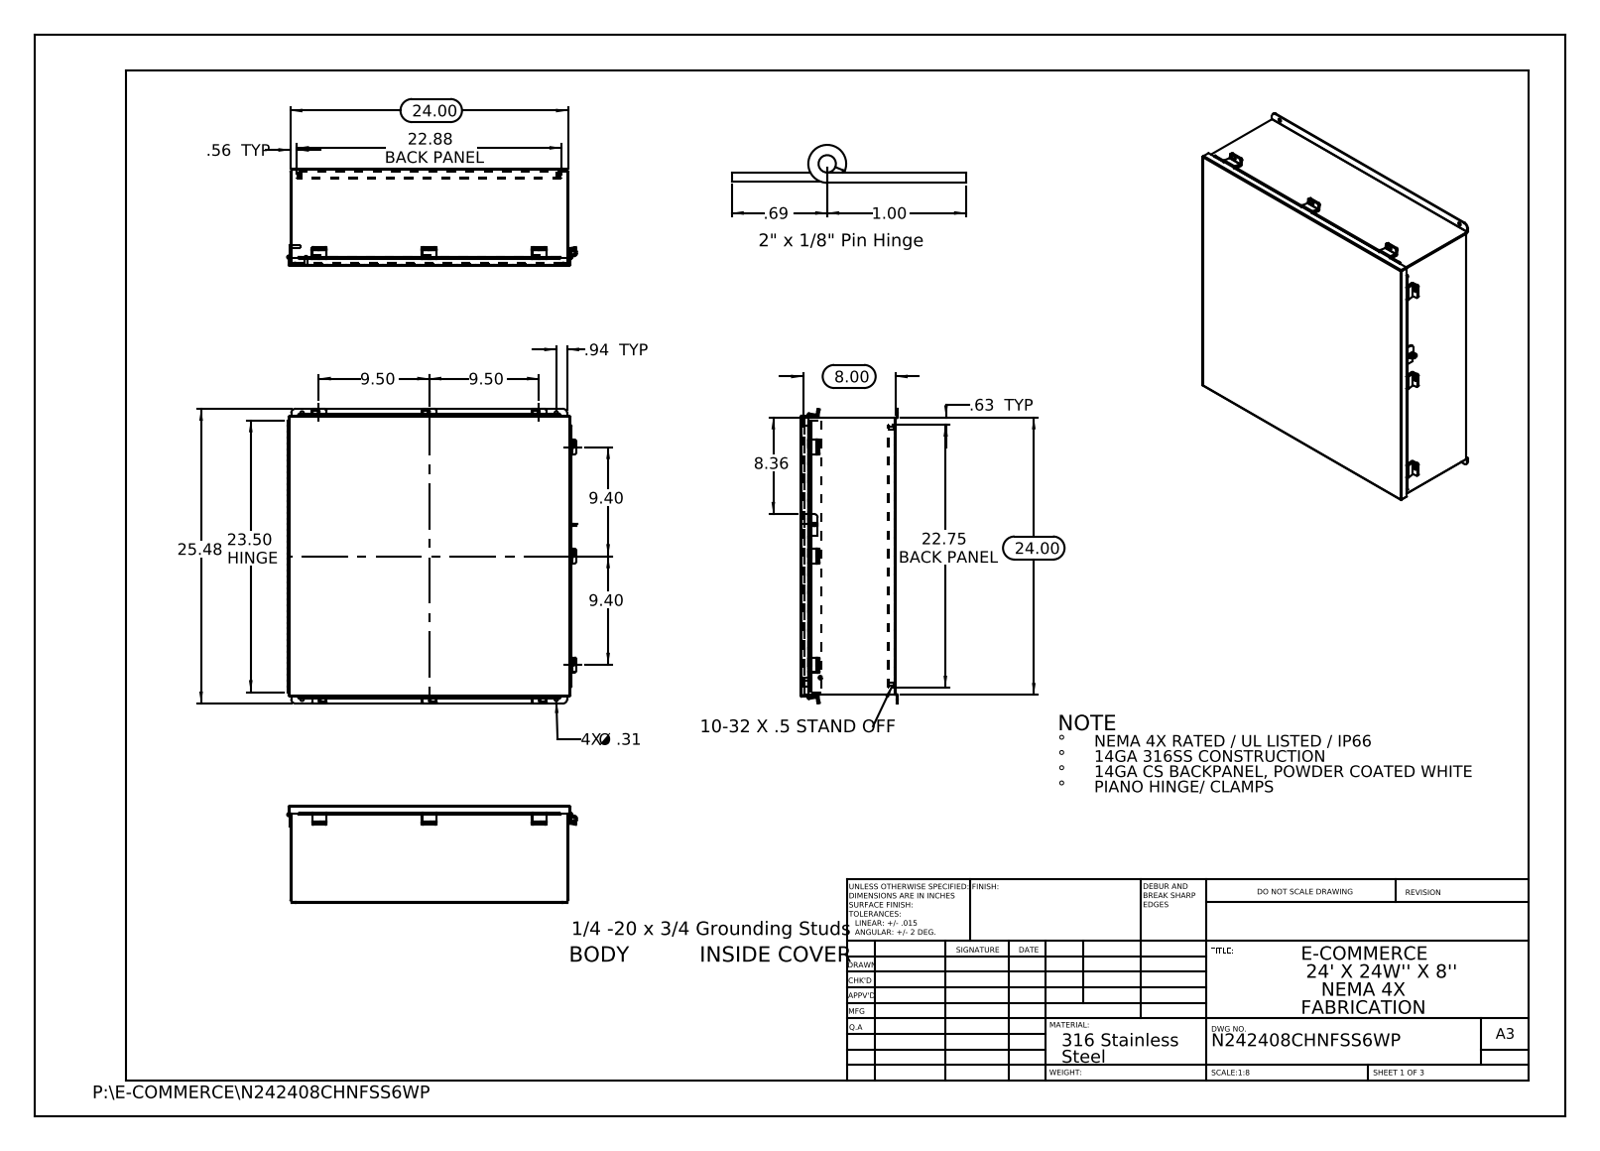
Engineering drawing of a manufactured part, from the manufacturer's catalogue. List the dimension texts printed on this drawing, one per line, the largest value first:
25.48
24.00
24.00
23.50 HINGE
22.88 BACK PANEL
22.75 BACK PANEL
9.50
9.50
9.40
9.40
8.36
8.00
1.00
.94 TYP
.69
.63 TYP
.56 TYP
4X Ø .31
